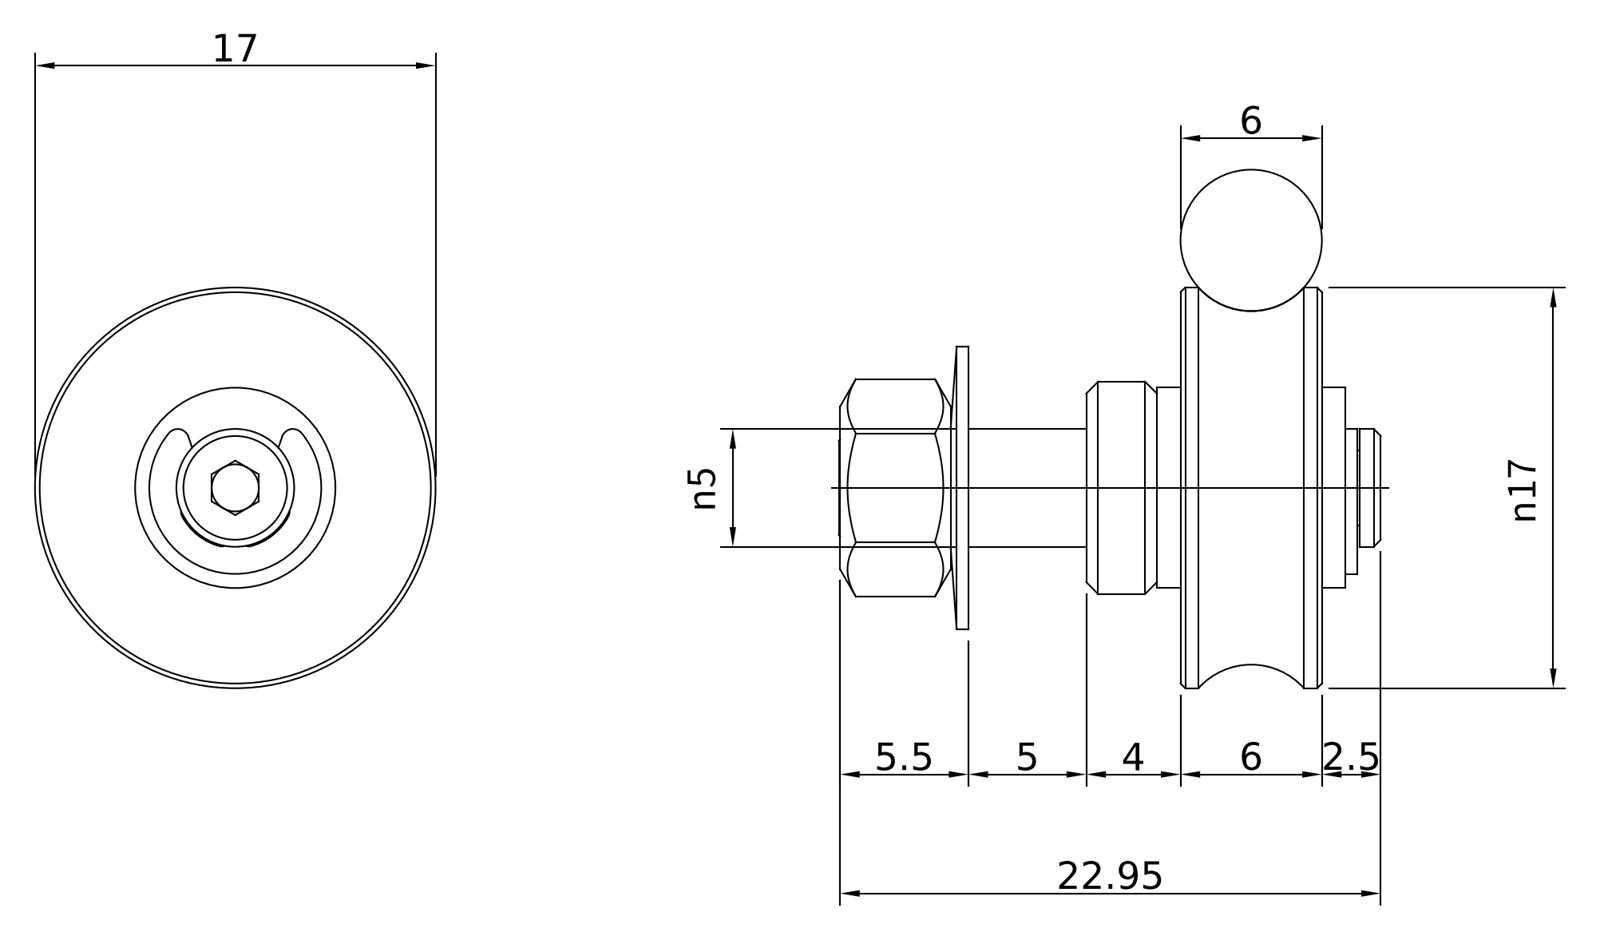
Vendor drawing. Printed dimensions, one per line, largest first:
22.95
17
n17
6
6
5.5
n5
5
4
2.5
